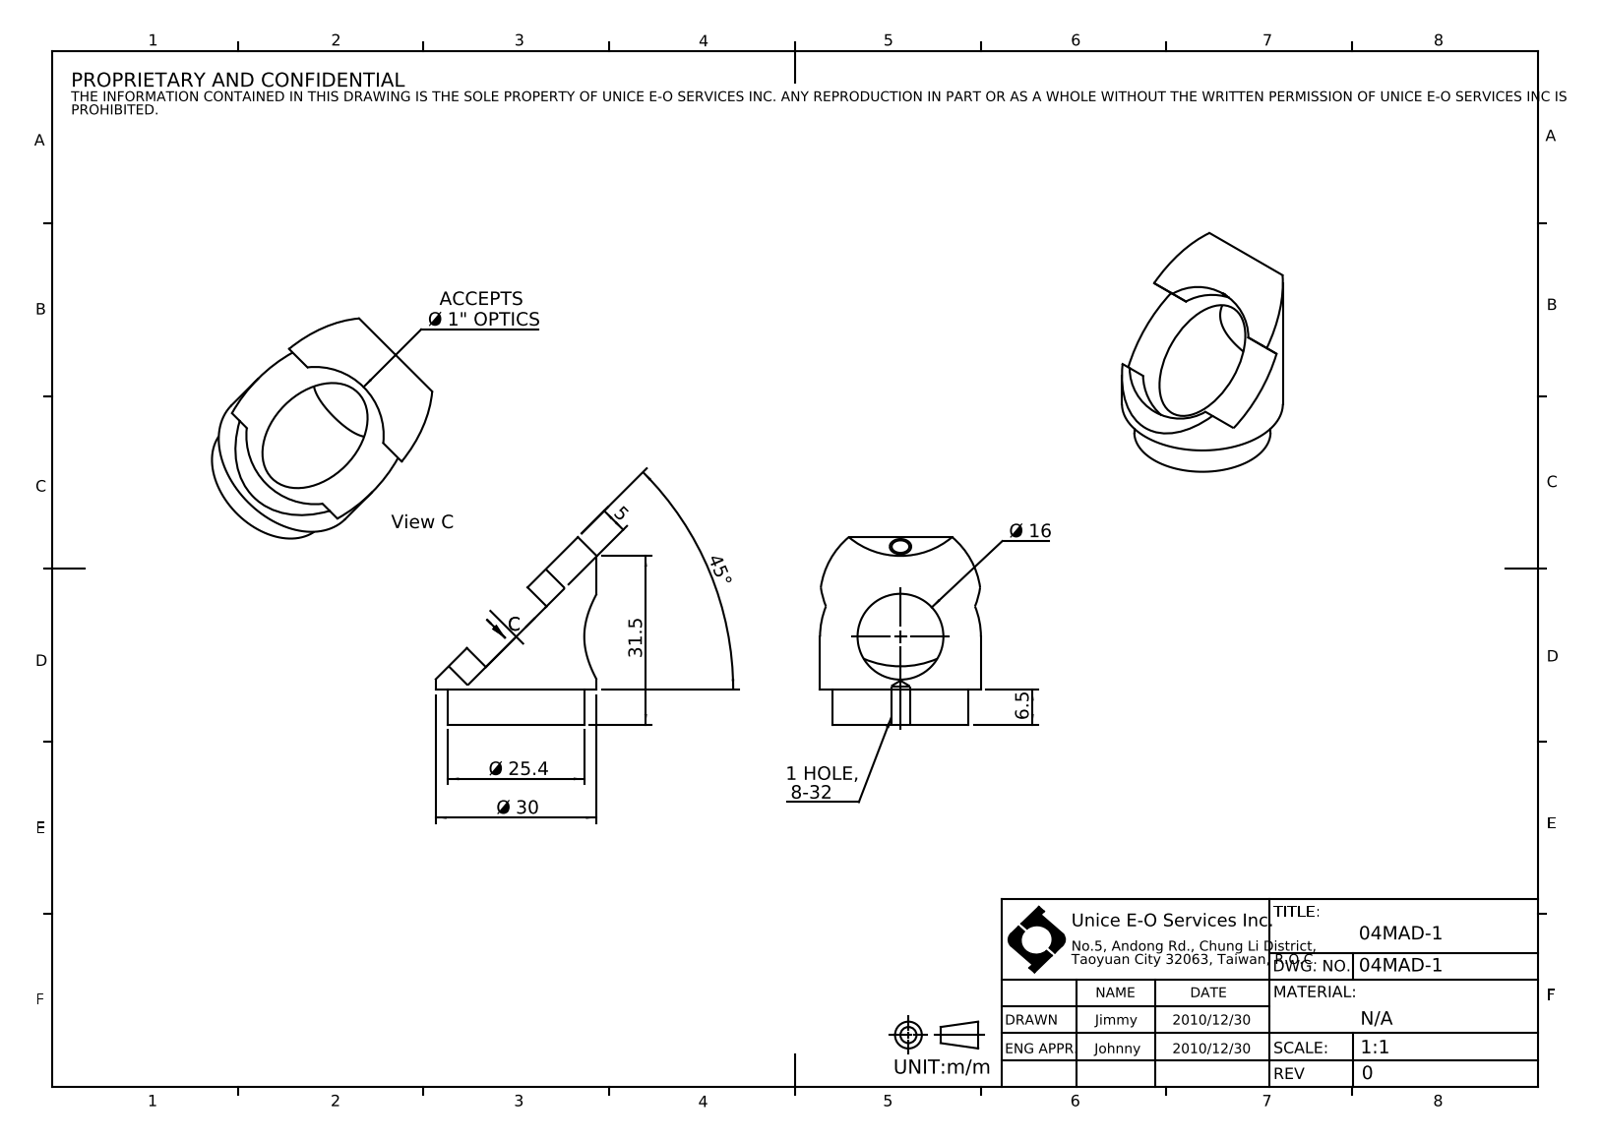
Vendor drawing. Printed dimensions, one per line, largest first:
45°
31.5
Ø 30
Ø 25.4
Ø 16
6.5
5
ACCEPTS Ø 1" OPTICS
